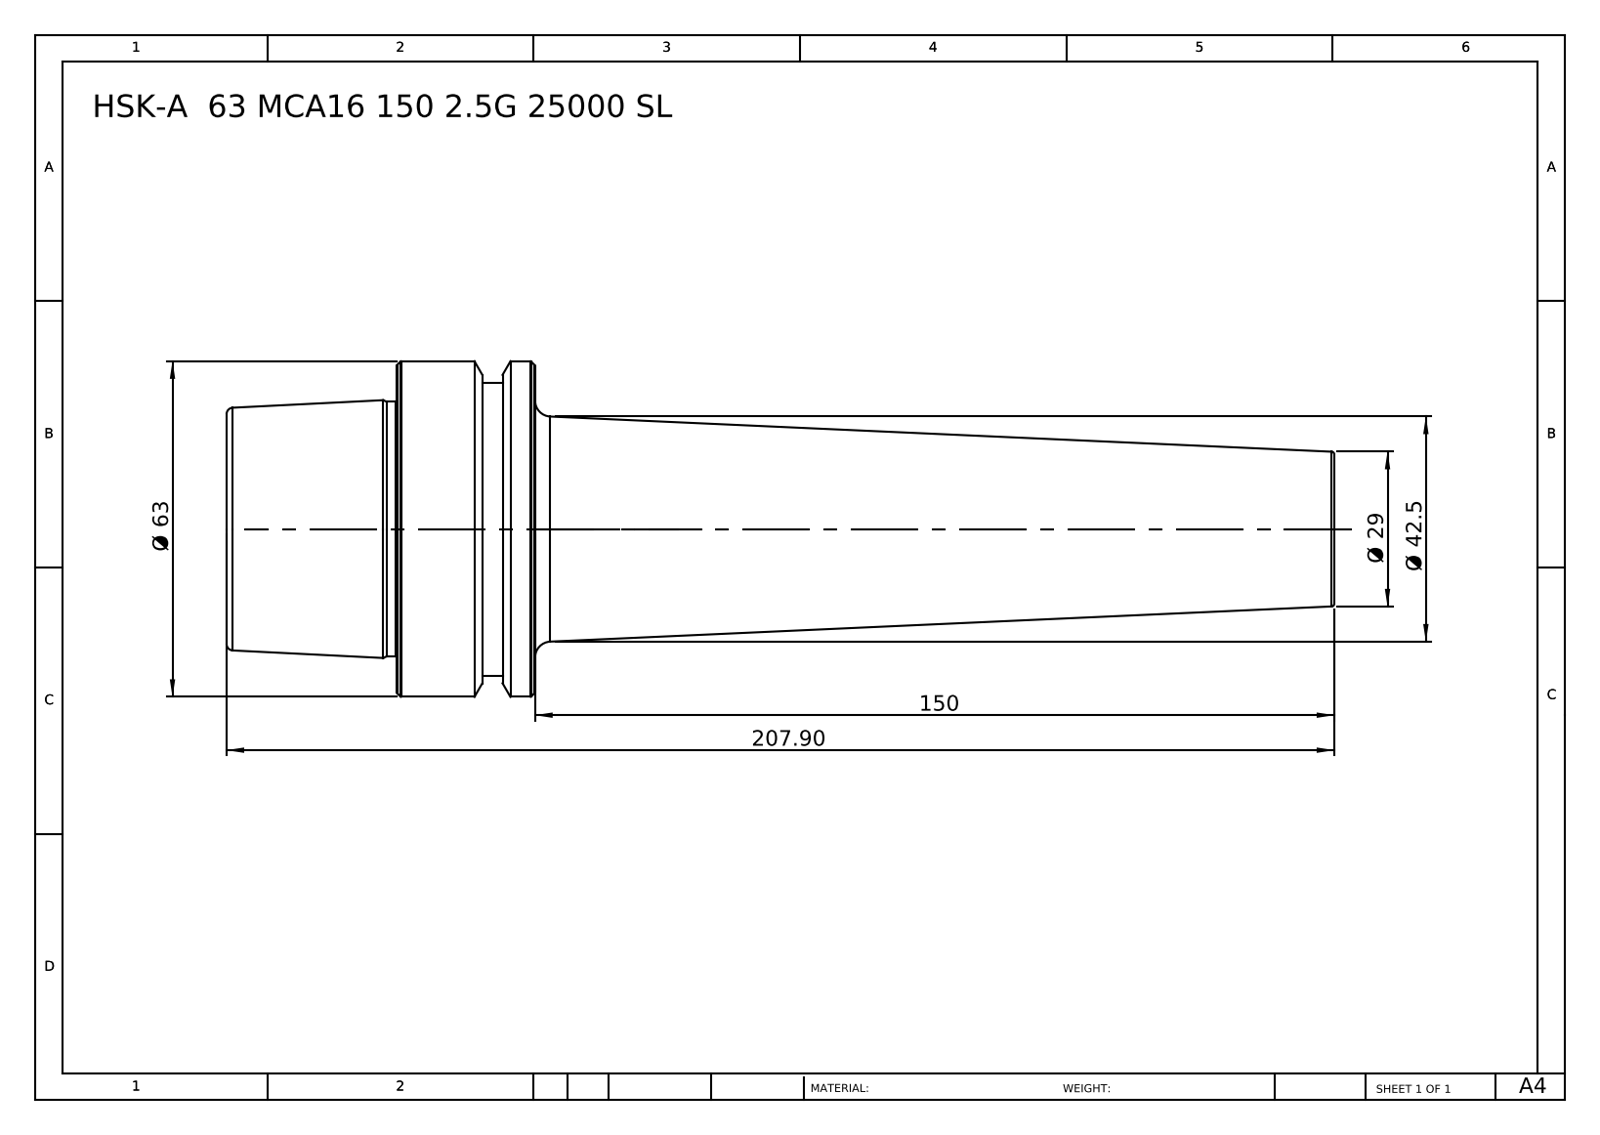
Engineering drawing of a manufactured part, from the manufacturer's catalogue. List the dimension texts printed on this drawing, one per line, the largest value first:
207.90
150
Ø 63
Ø 42.5
Ø 29
